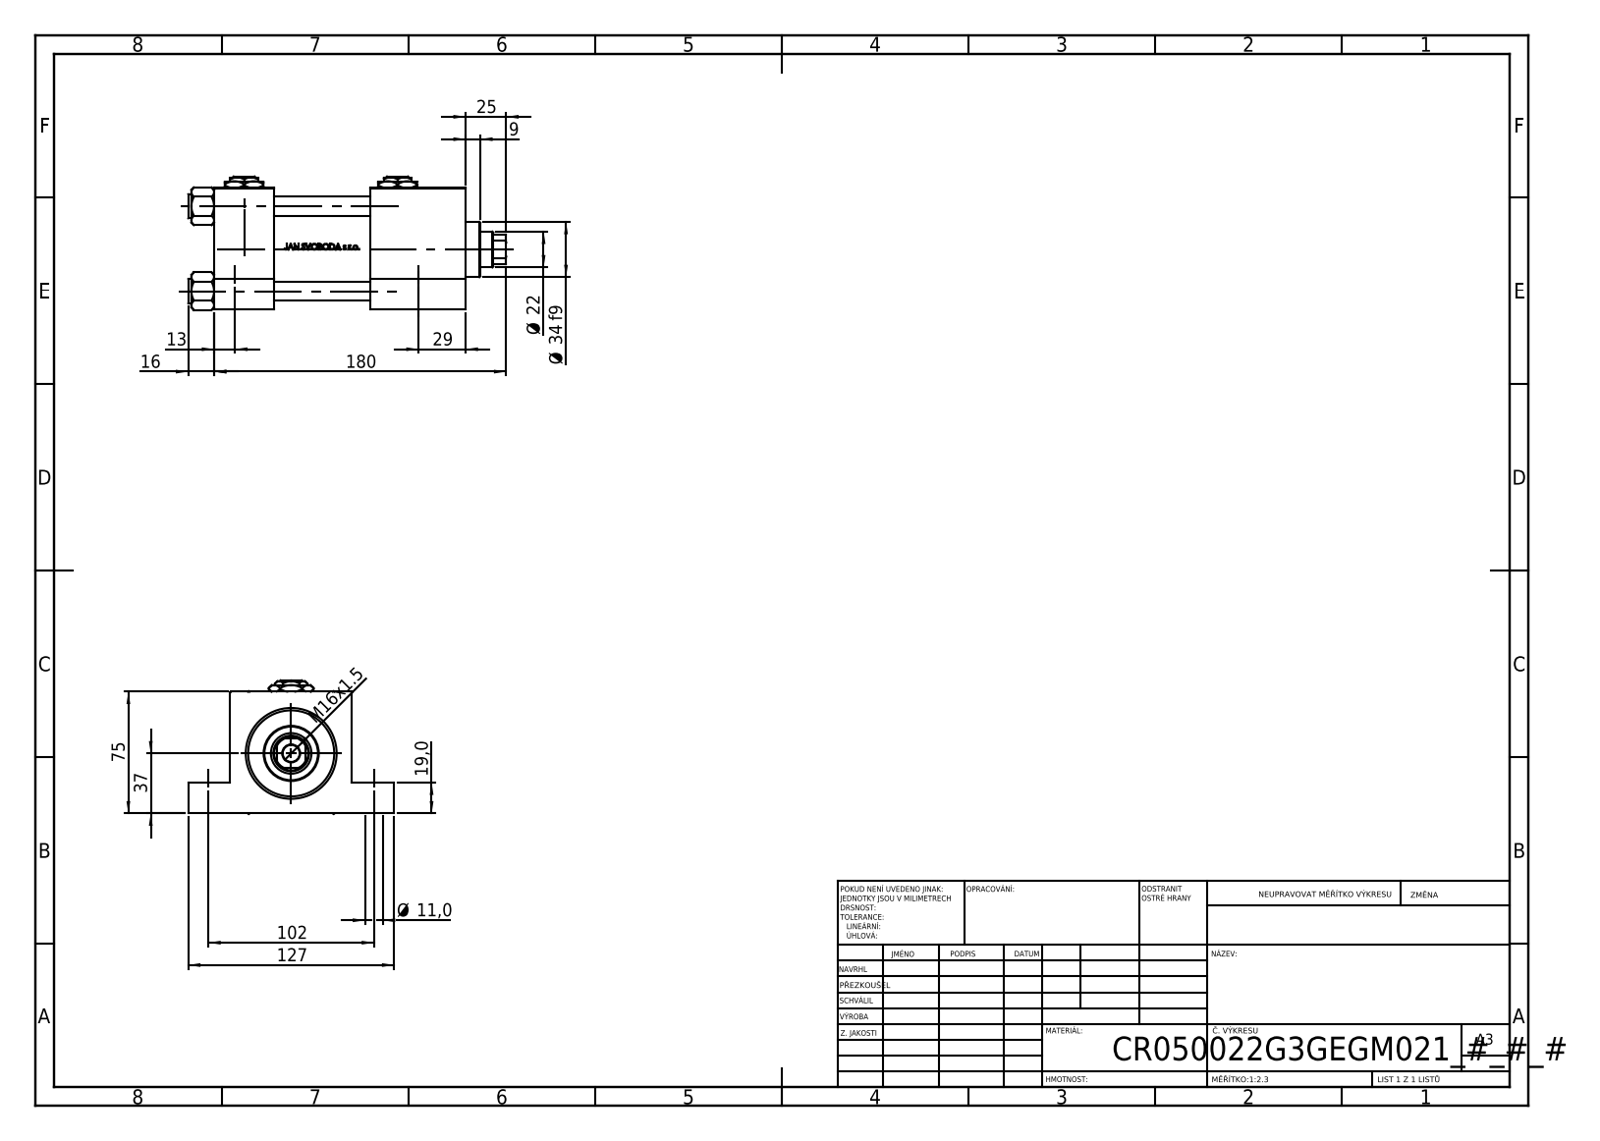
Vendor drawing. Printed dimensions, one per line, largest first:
180
127
102
75
37
Ø 34 f9
29
25
Ø 22
19,0
16
M16x1.5
13
Ø 11,0
9
